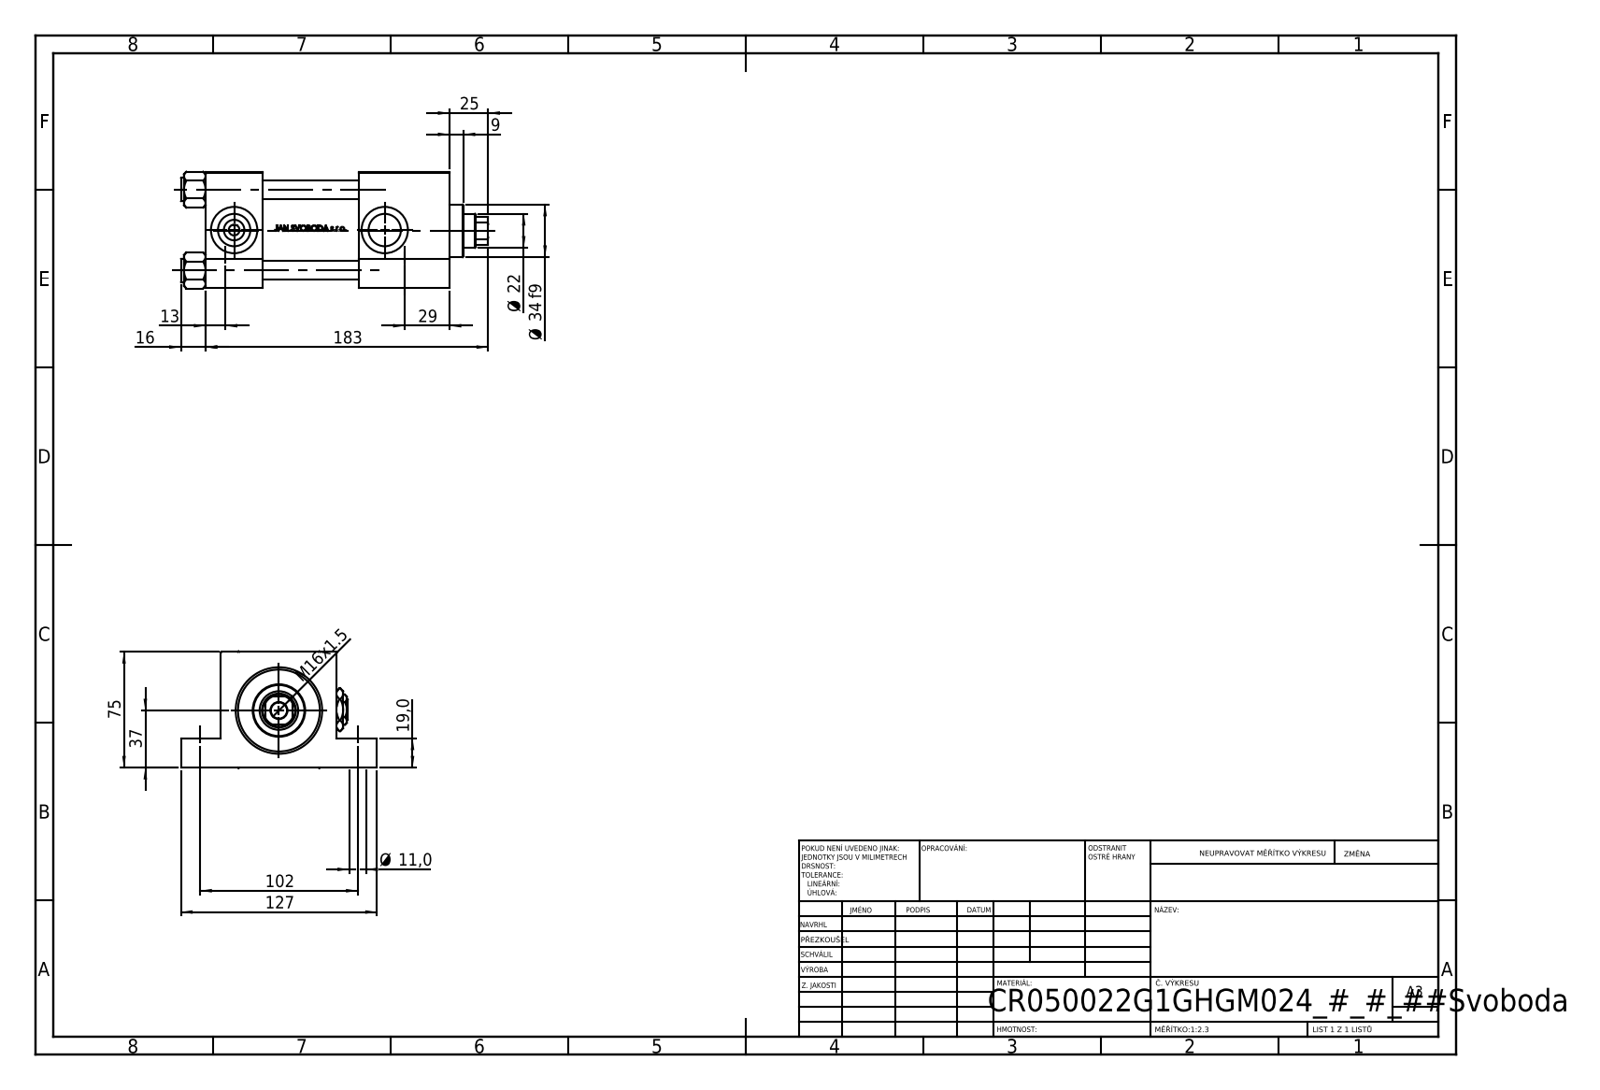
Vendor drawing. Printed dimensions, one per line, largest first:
183
127
102
75
37
Ø 34 f9
29
25
Ø 22
19,0
16
M16x1.5
13
Ø 11,0
9
